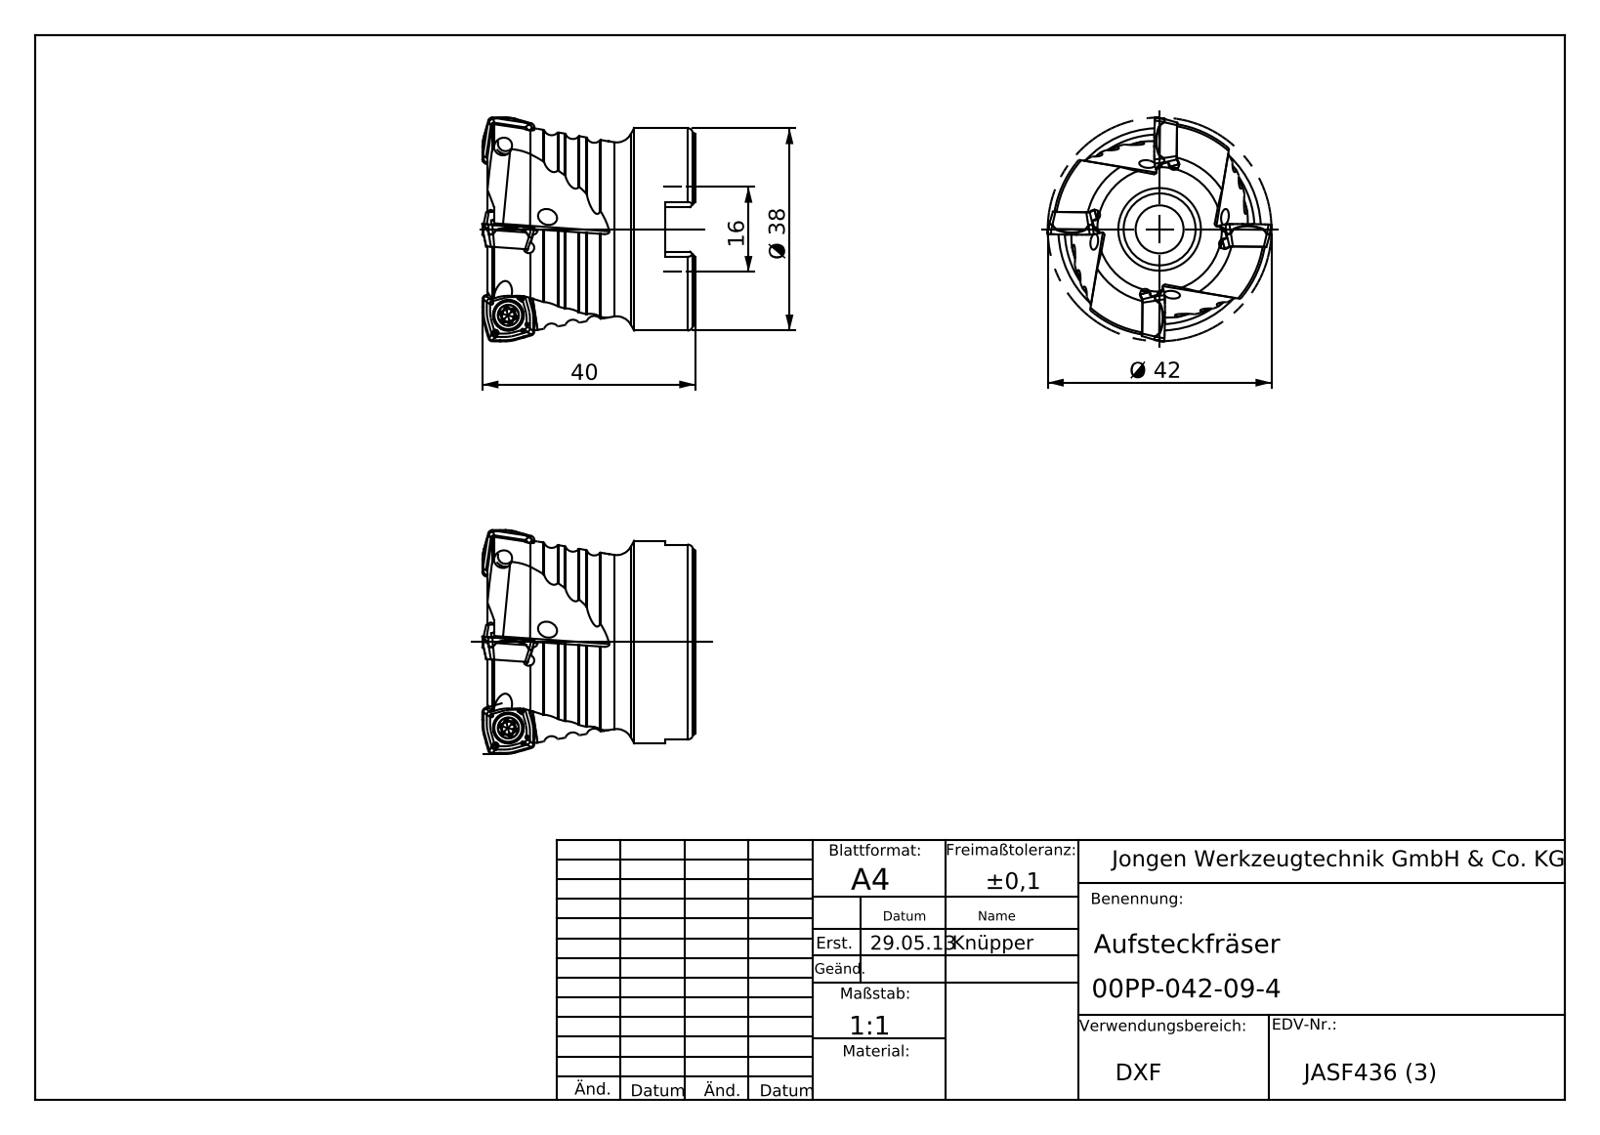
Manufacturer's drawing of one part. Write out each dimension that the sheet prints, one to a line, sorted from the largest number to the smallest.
Ø 42
40
Ø 38
16
